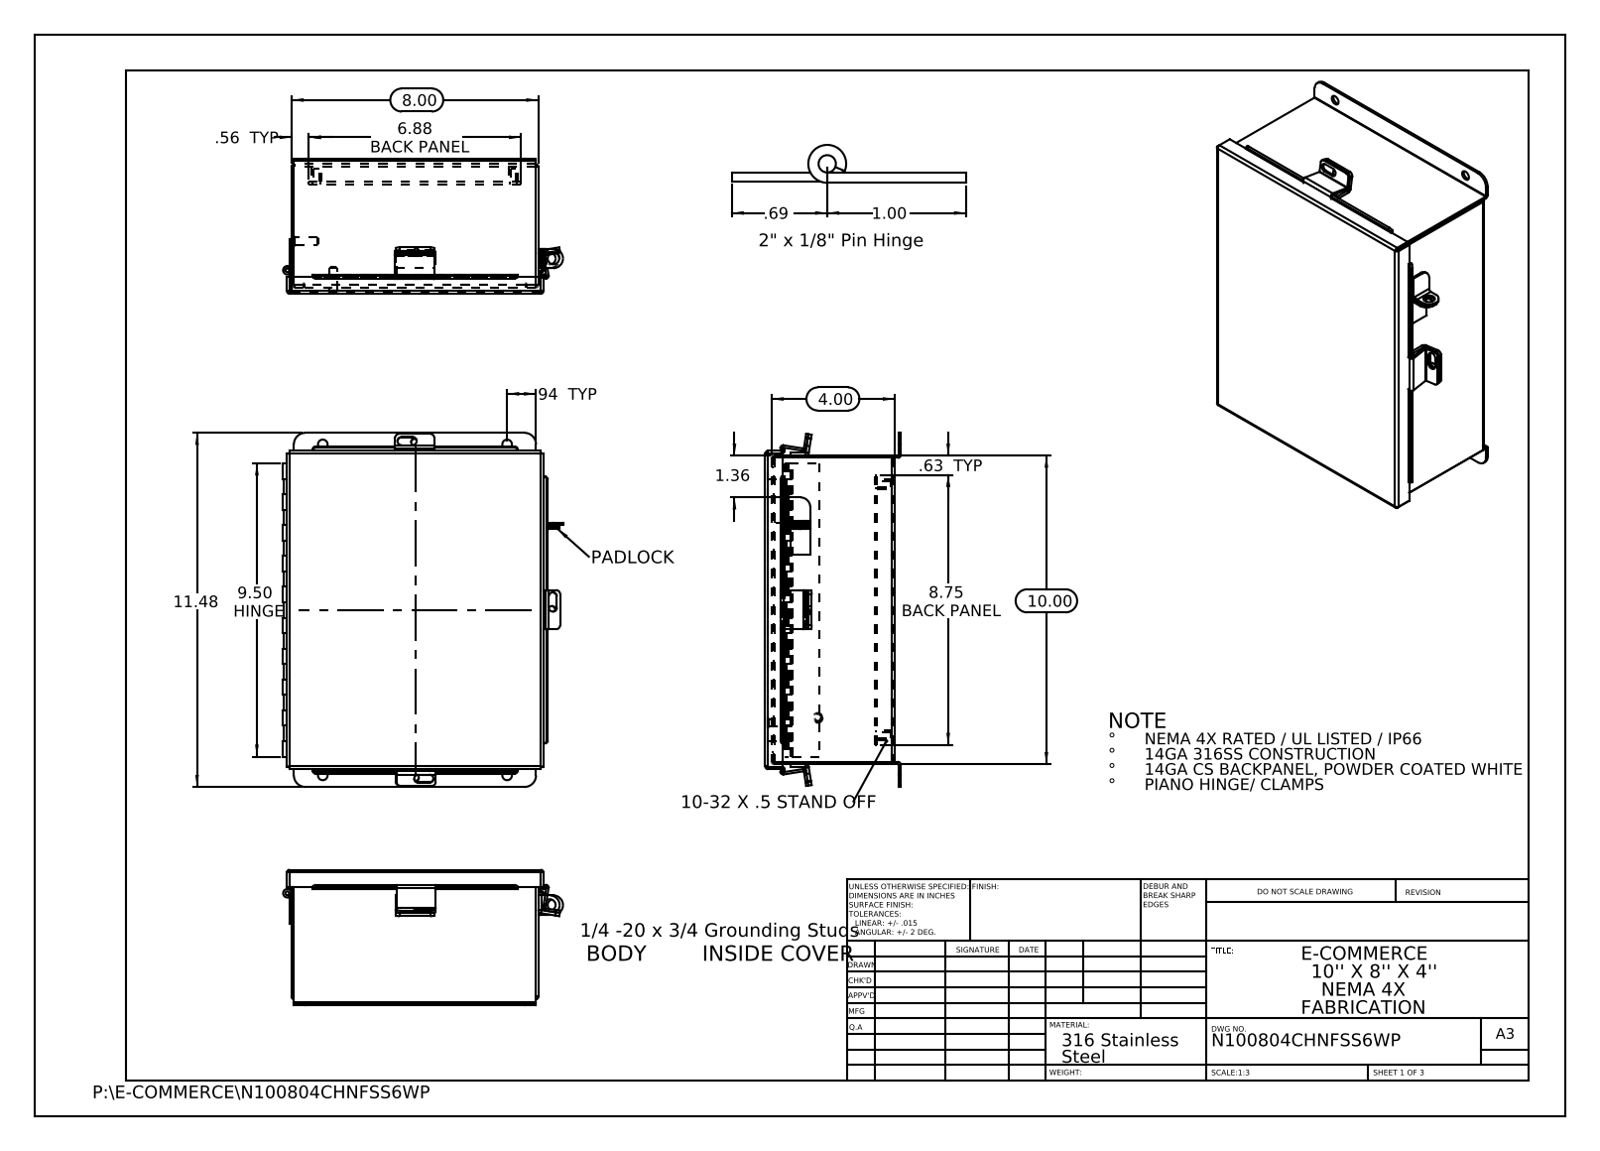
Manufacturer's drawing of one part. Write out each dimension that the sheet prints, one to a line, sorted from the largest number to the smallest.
11.48
10.00
9.50 HINGE
8.75 BACK PANEL
8.00
6.88 BACK PANEL
4.00
1.36
1.00
.94 TYP
.69
.63 TYP
.56 TYP
